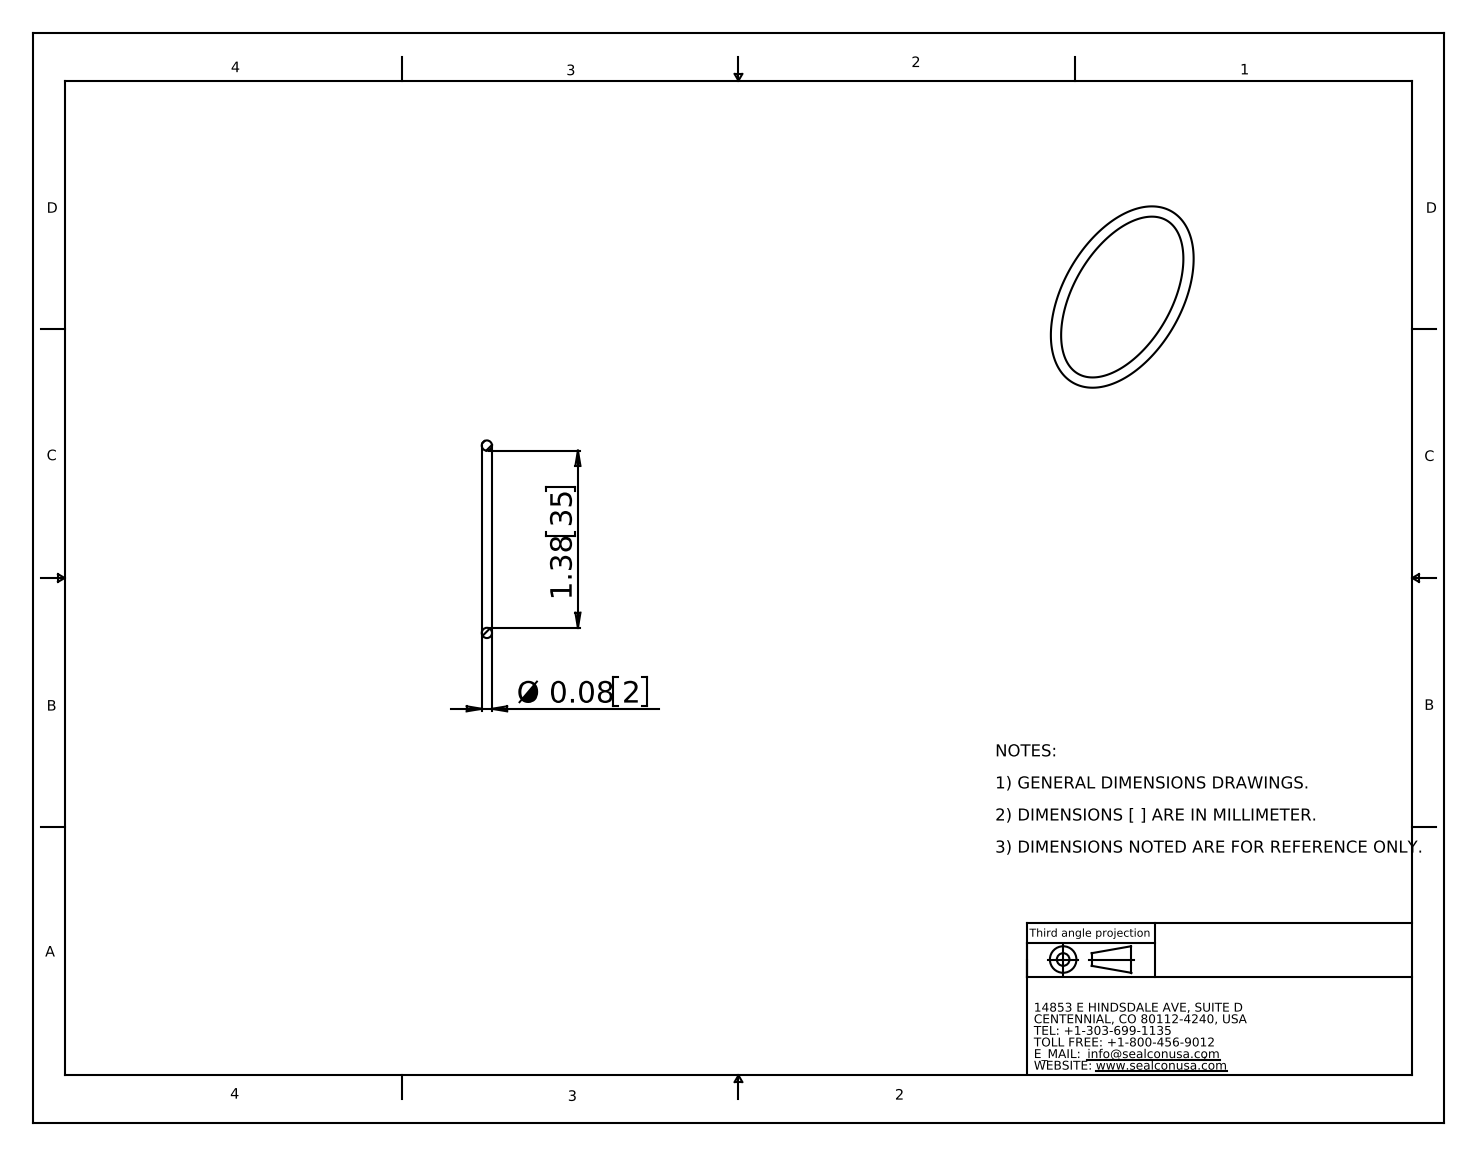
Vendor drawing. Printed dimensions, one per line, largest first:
1.38 35
Ø 0.08 2
